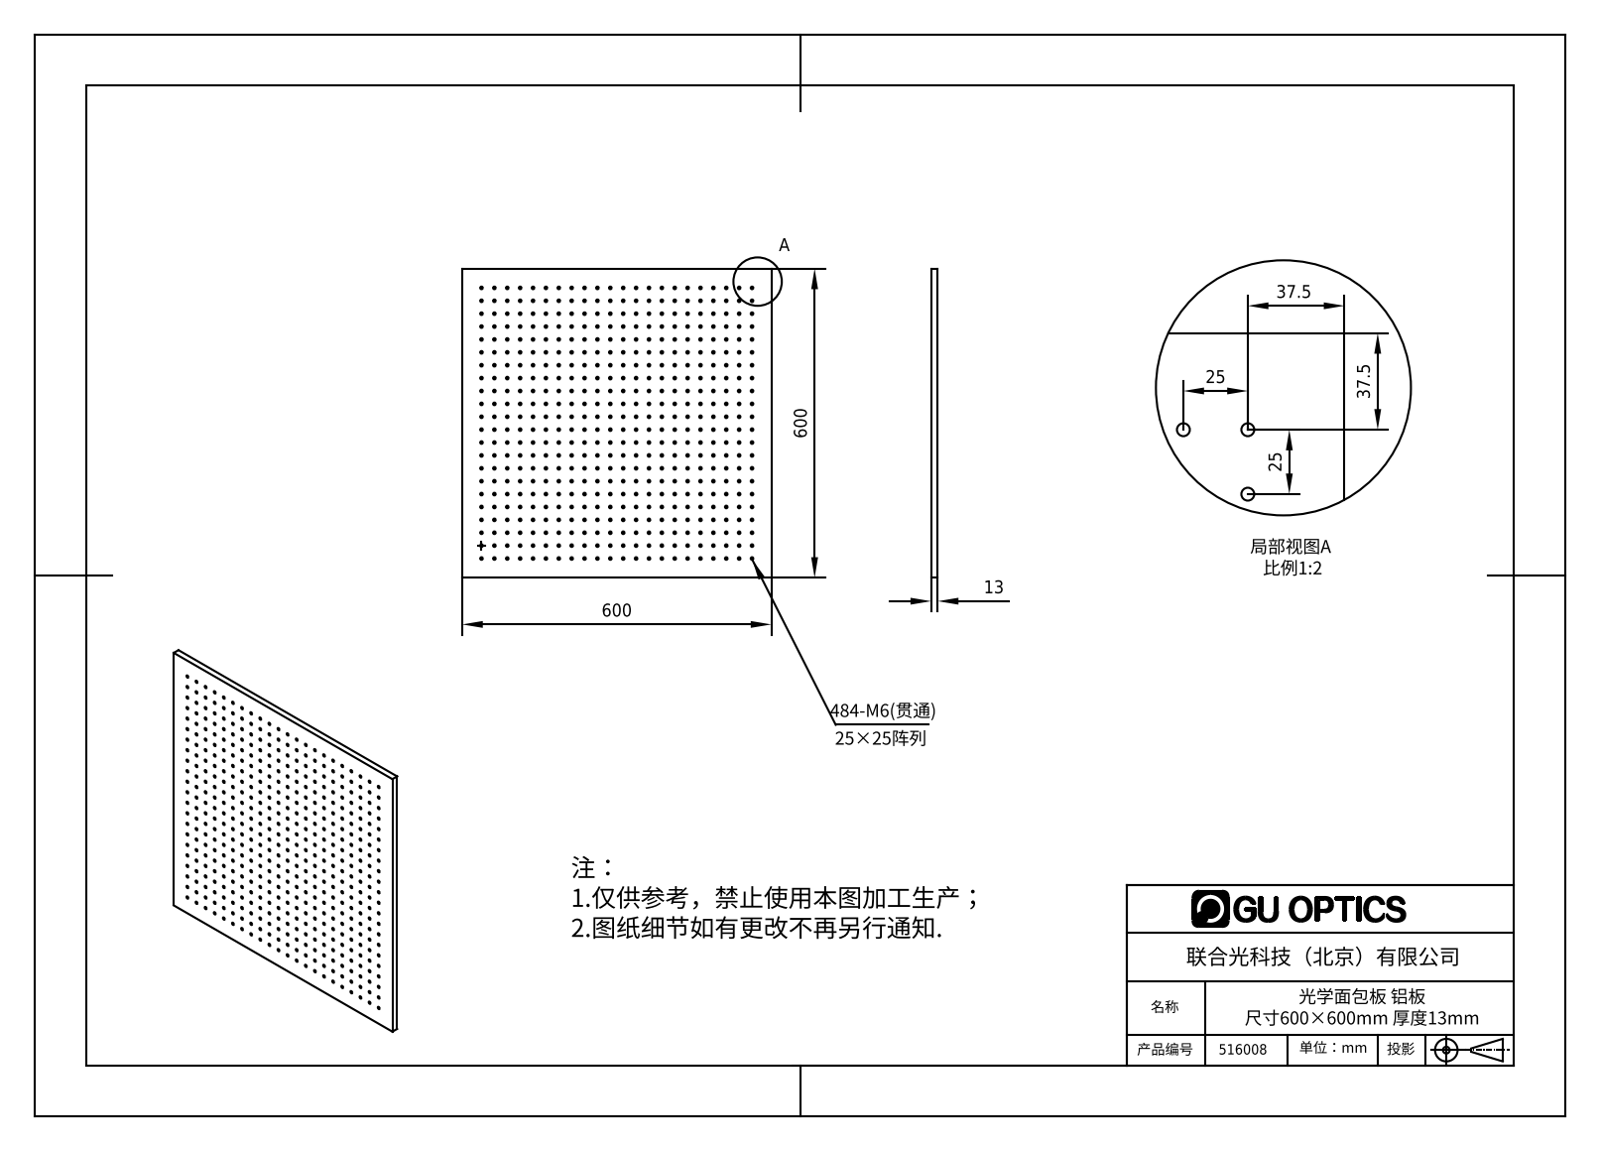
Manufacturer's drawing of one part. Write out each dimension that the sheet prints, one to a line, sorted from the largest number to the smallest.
600
600
37.5
37.5
25
25
13
